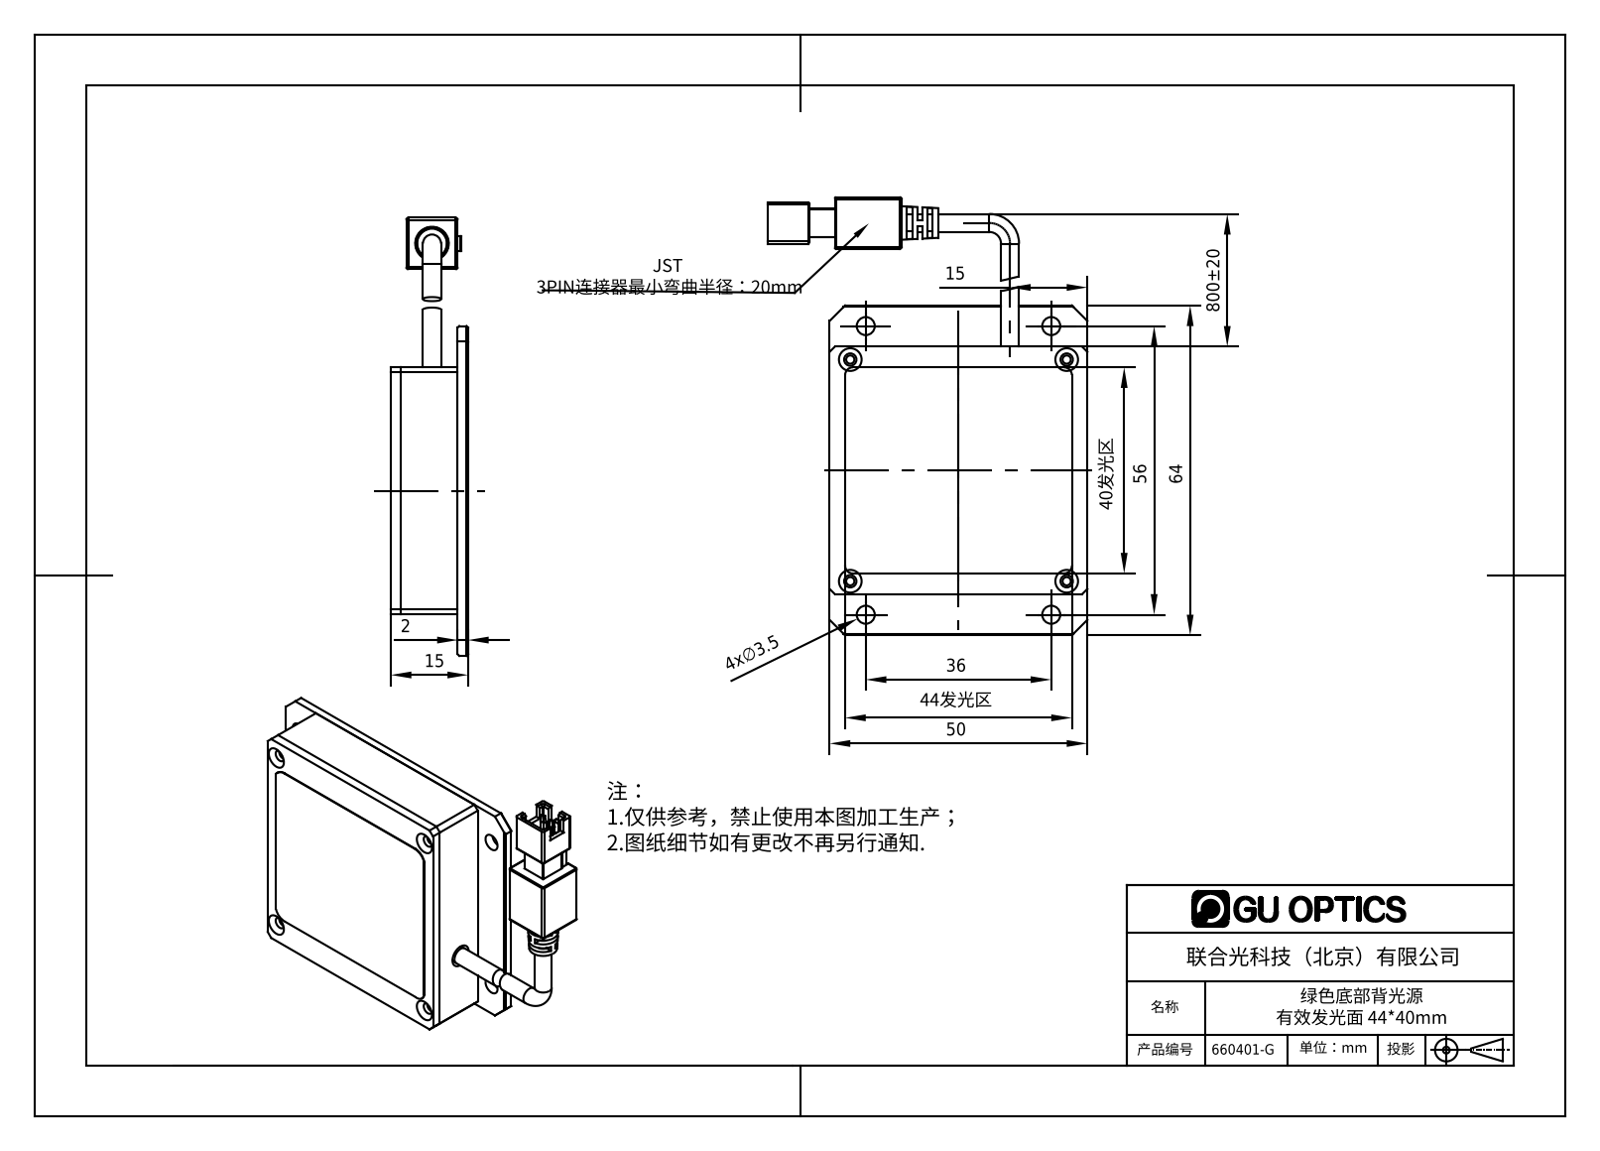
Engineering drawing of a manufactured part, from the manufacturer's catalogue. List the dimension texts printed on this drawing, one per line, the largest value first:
800±20
64
56
50
44发光区
40发光区
36
15
15
4x∅3.5
2
